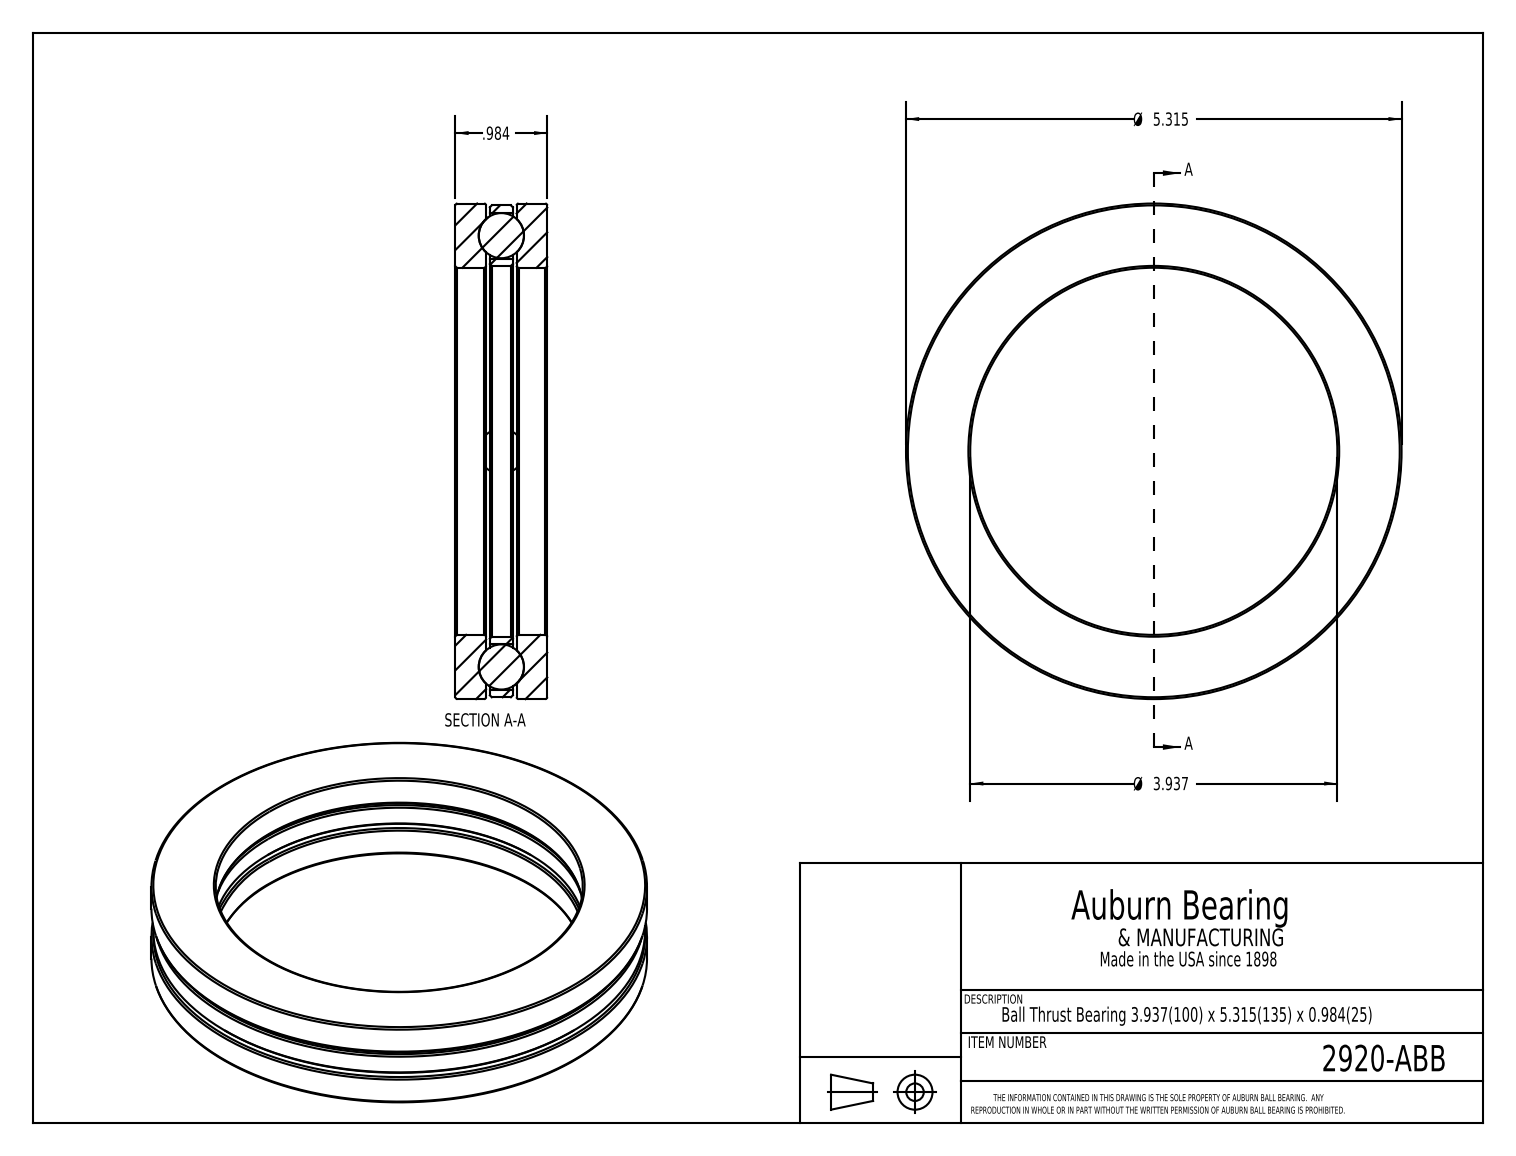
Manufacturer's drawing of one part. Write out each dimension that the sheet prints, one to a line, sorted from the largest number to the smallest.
Ø 5.315
Ø 3.937
.984
